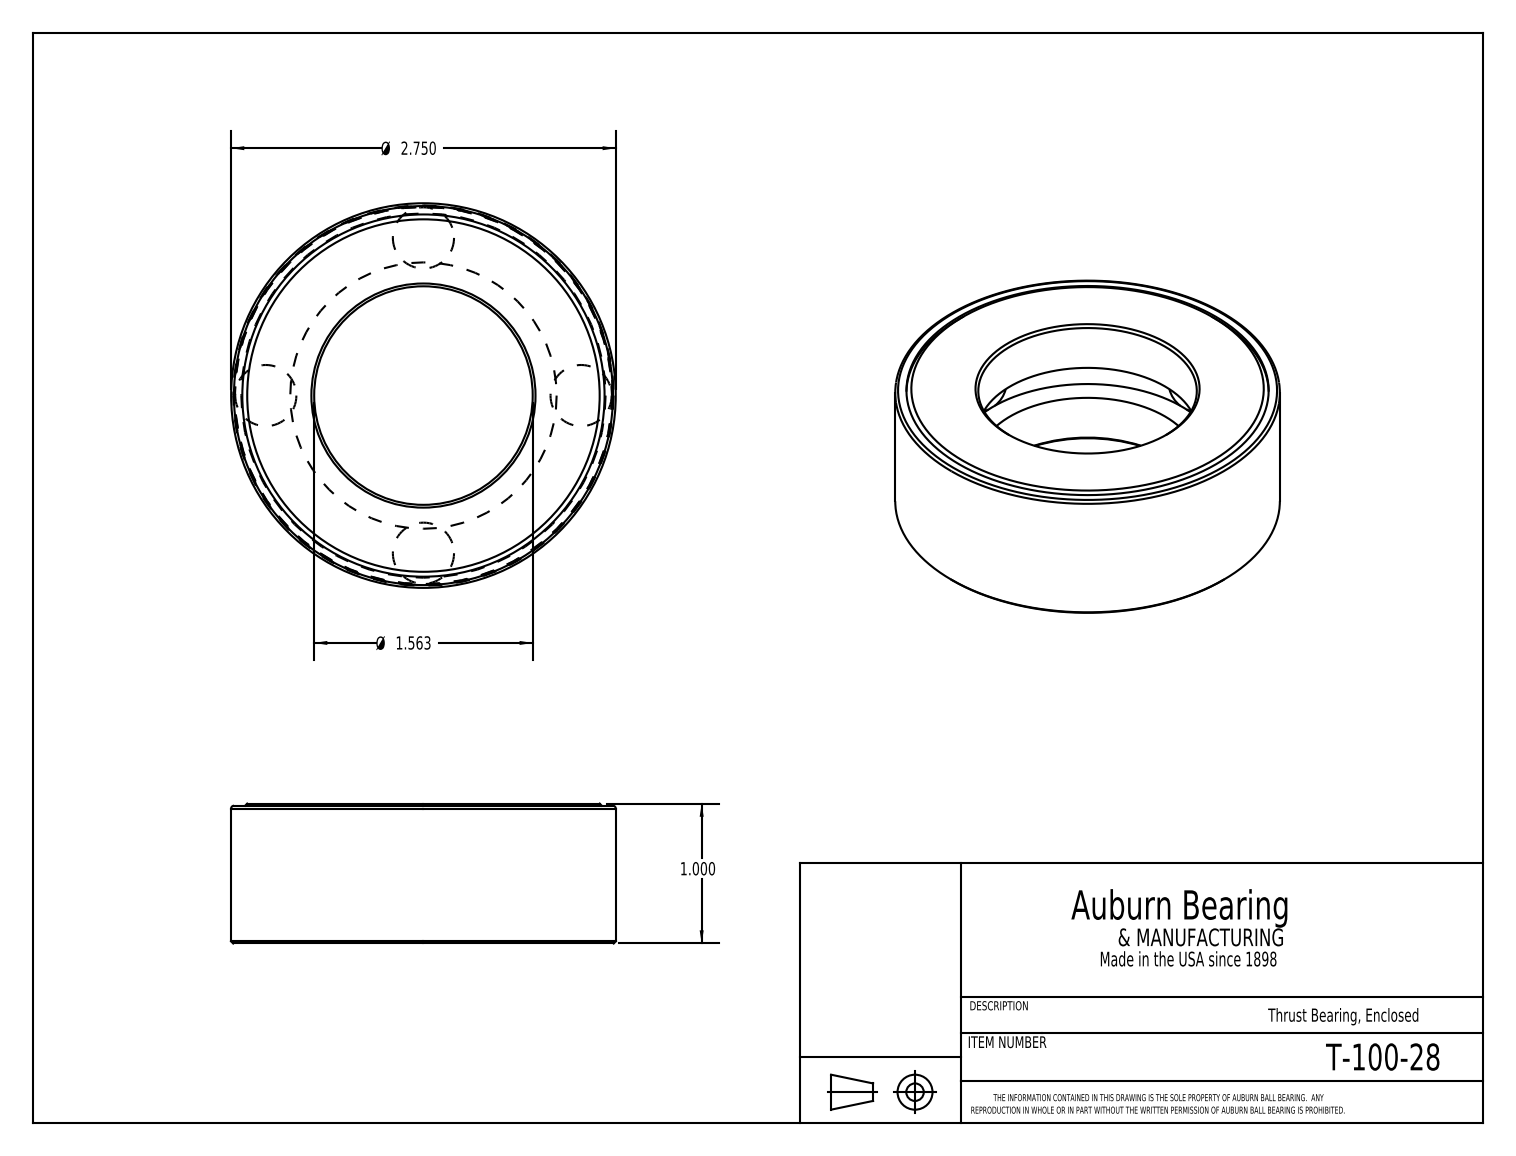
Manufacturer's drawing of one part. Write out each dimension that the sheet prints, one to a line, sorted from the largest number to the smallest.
Ø 2.750
Ø 1.563
1.000
